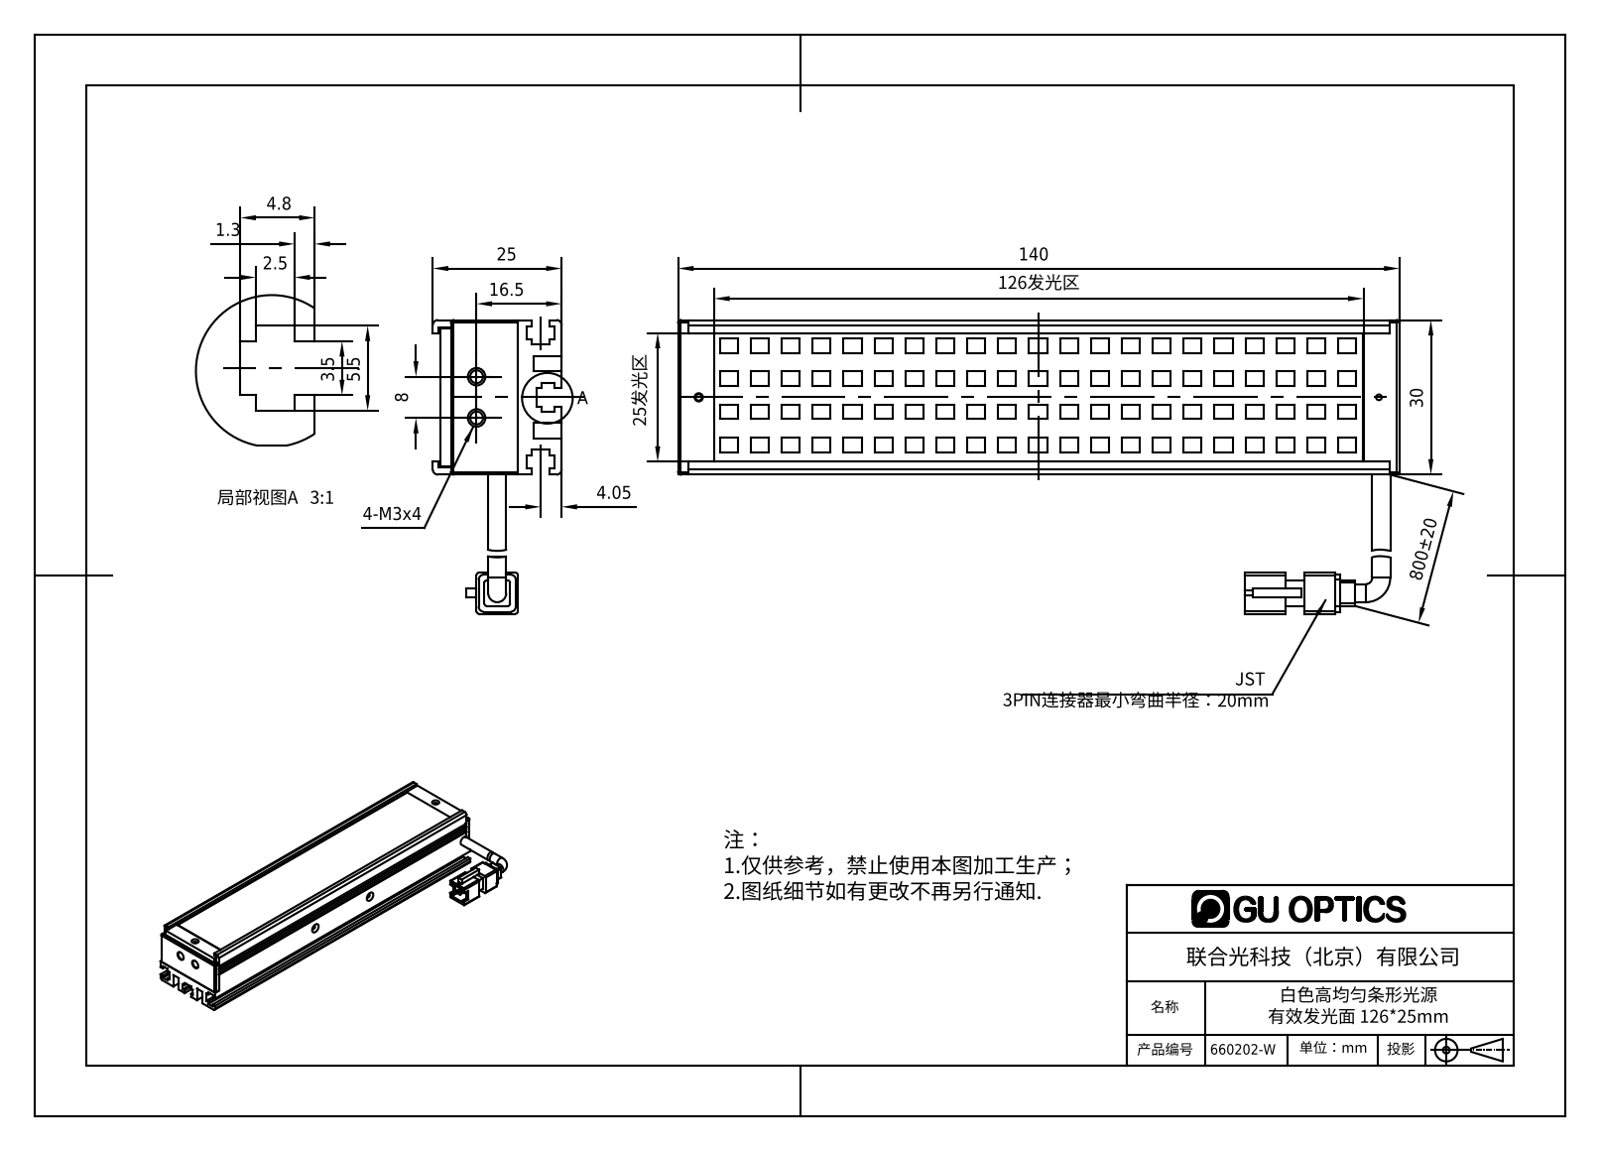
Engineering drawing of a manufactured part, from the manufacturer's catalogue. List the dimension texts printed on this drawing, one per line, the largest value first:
800±20
140
126发光区
30
25发光区
25
16.5
8
5.5
4.8
4.05
3.5
2.5
1.3
